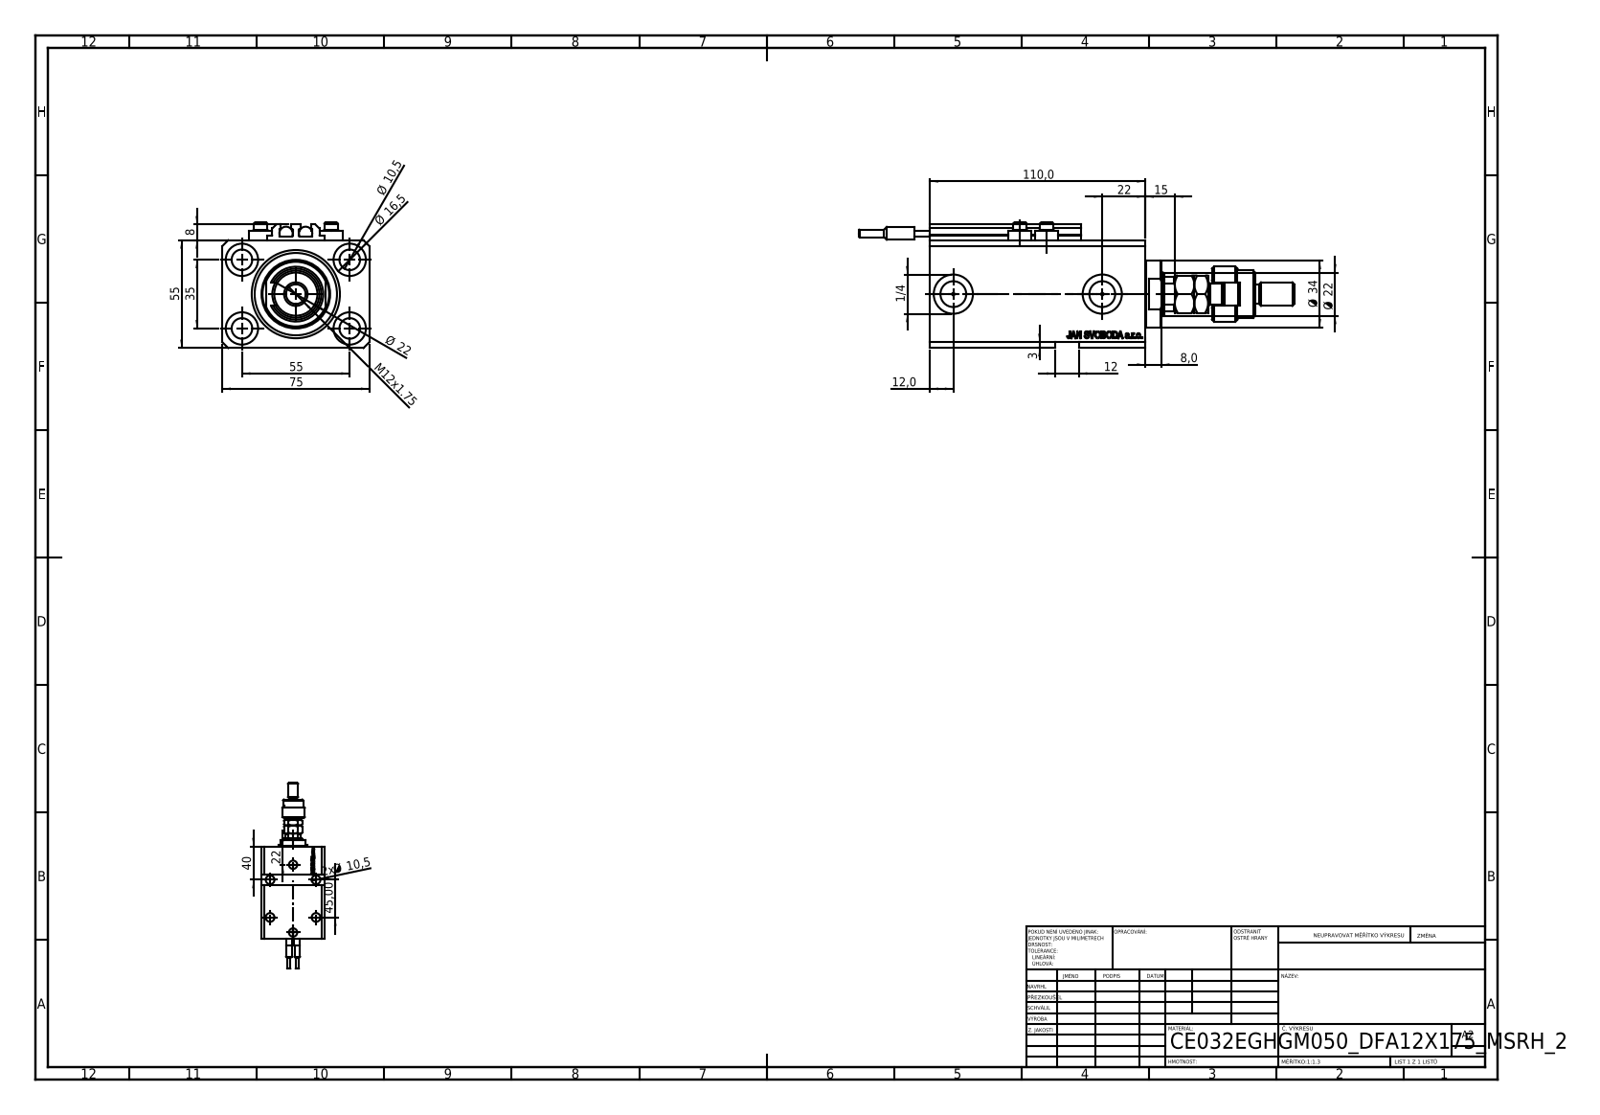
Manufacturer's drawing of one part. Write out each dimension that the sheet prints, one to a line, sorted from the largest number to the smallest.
110,0
75
55
55
45,00
40
35
Ø 34
Ø 22
22
Ø 22
22
Ø 16,5
15
M12x1.75
12,0
12
Ø 10,5
2x Ø 10,5
8
8,0
3
1/4
